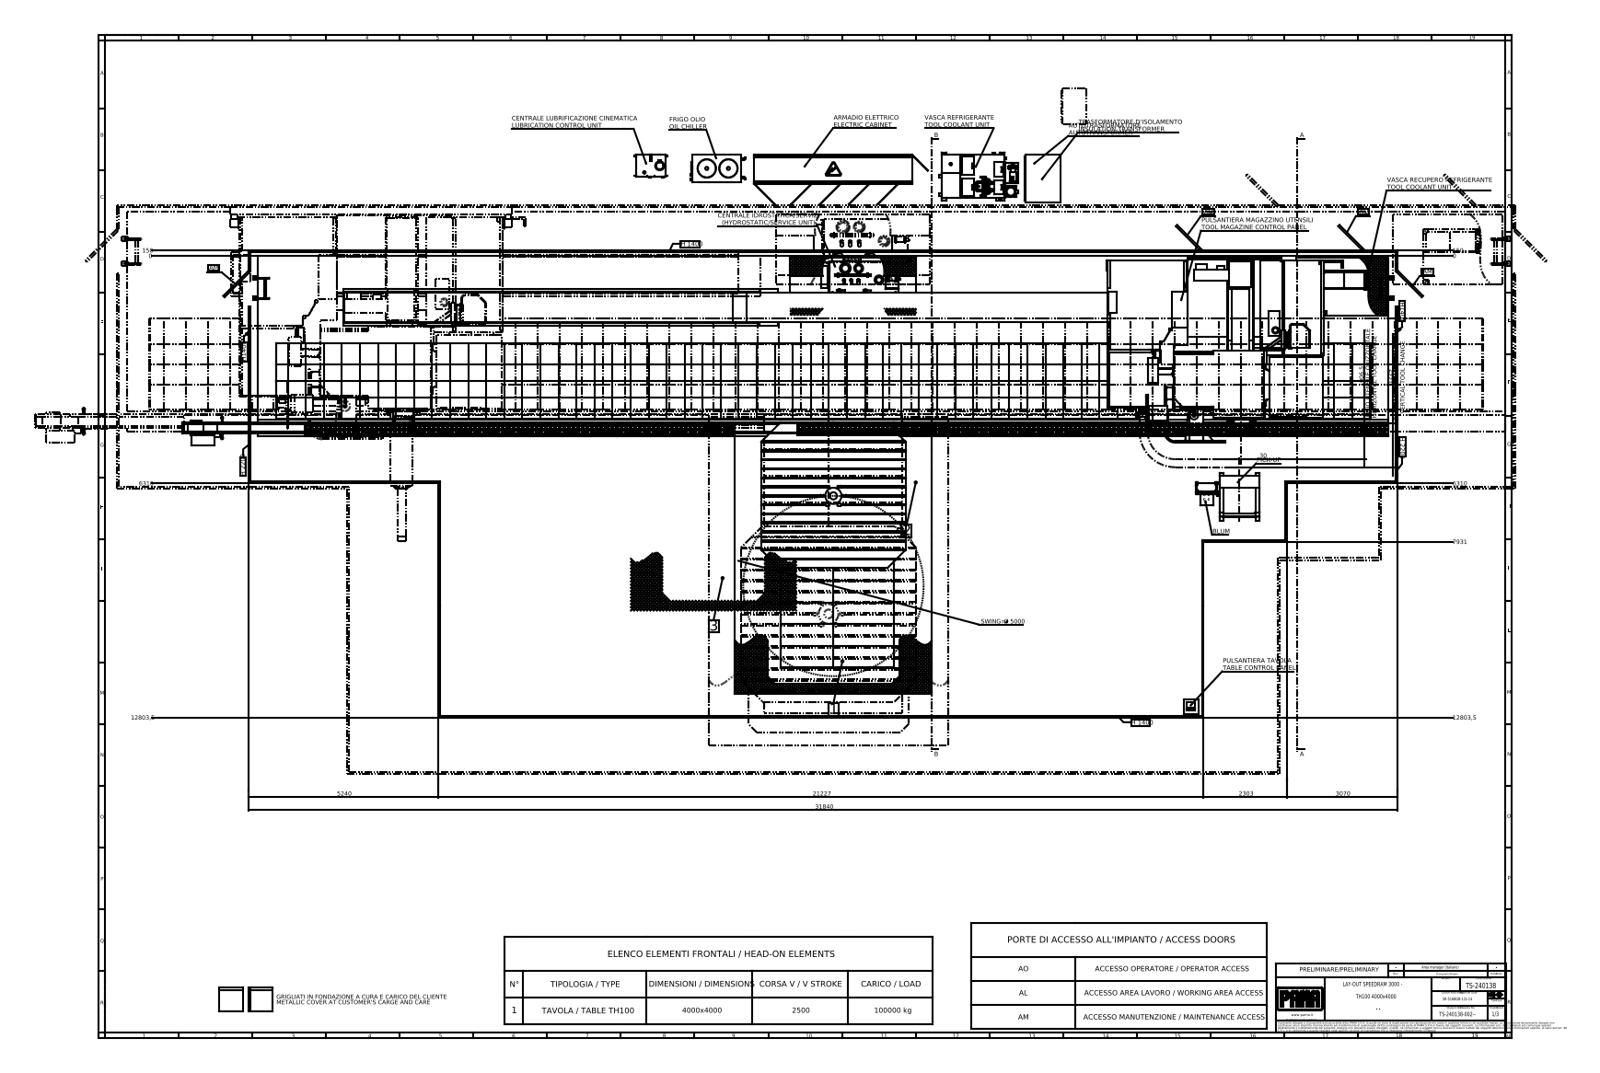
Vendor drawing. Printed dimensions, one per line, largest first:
31840
21227
12803,5
12803,5
7931
6310
6310
5240
SWING= Ø 5000
3070
2303
1229 CAMBIO UTENSILE VERTICALE VERTICAL TOOL CHANGE
1006,5 CAMBIO UTENSILE ORIZZONTALE HORIZONTAL TOOL CHANGE
150
150
30
0
0
